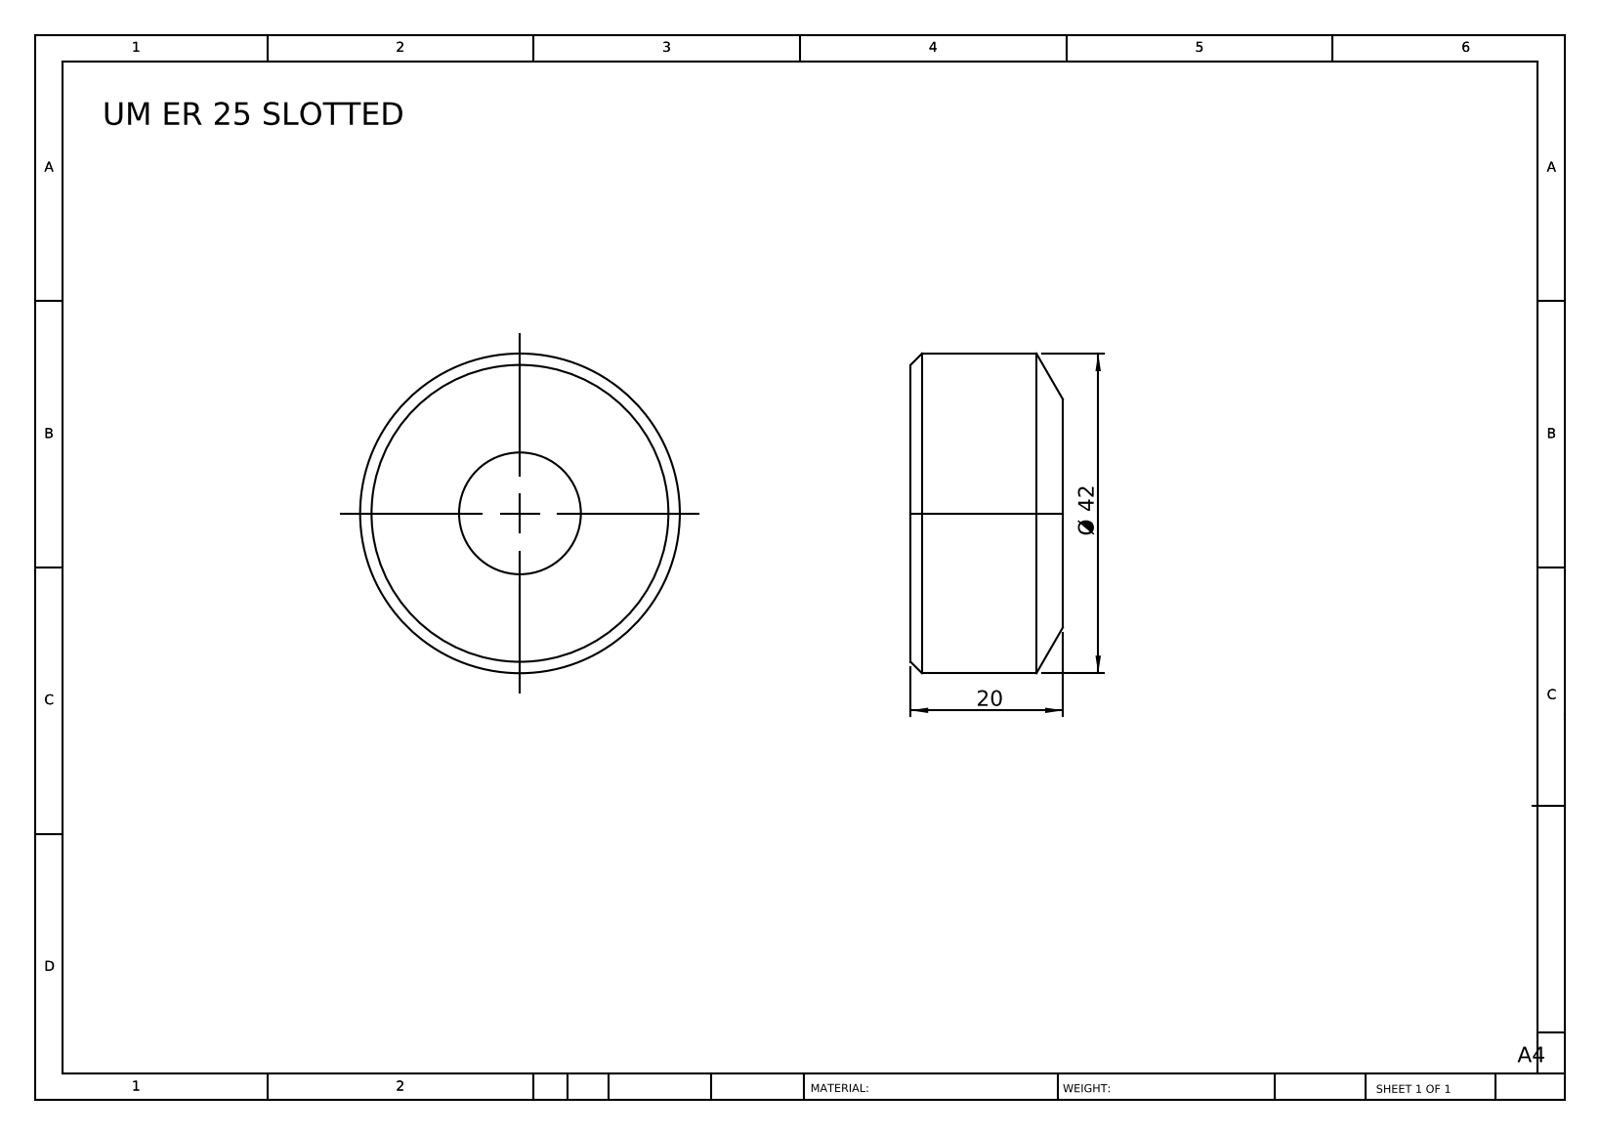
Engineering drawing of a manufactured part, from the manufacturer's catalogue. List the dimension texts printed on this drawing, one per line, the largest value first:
Ø 42
20
